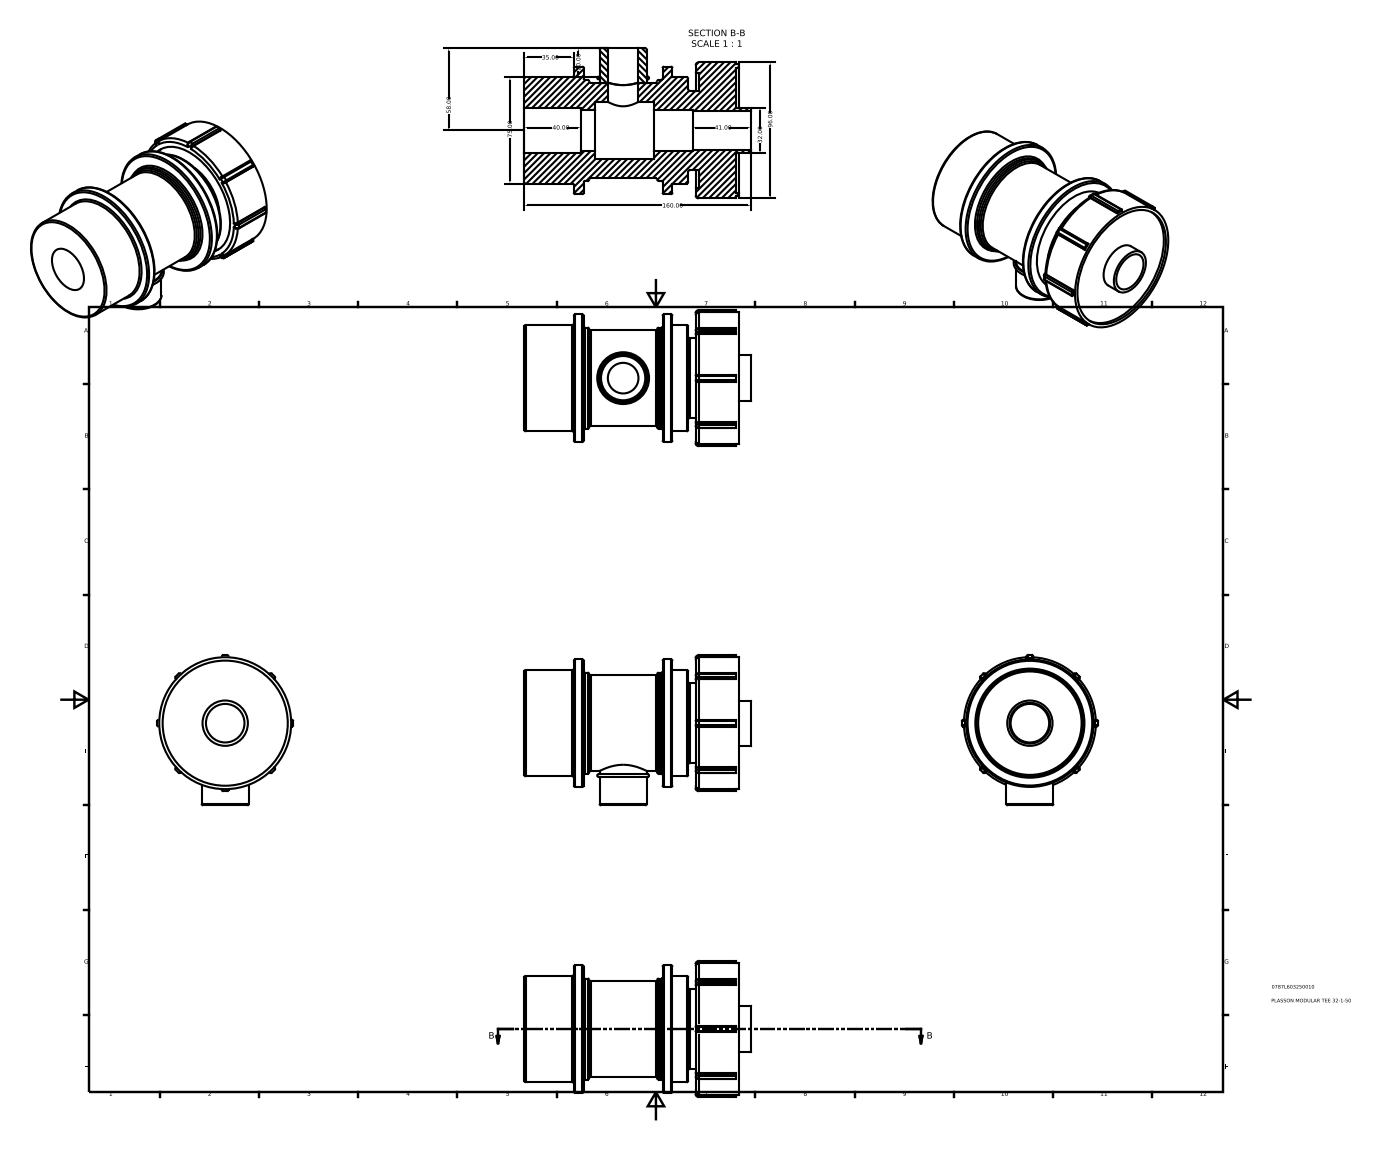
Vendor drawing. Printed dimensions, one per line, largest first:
160.00
96.00
75.00
58.00
41.00
40.00
35.00
32.00
20.00
